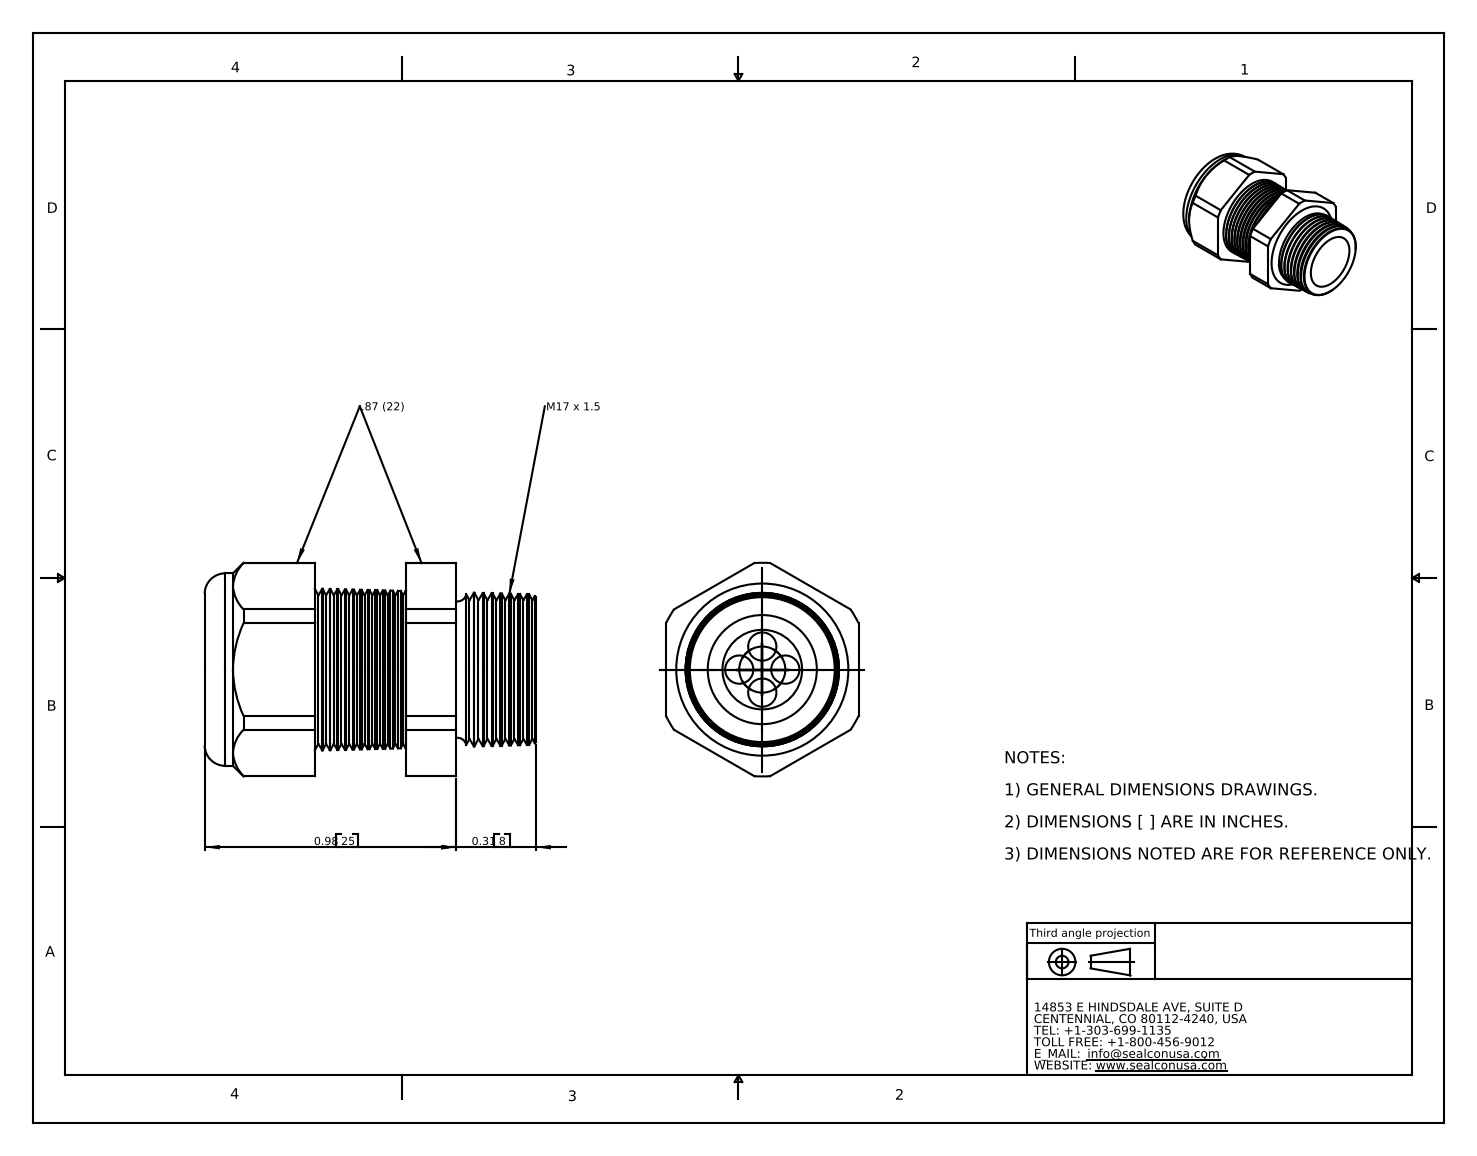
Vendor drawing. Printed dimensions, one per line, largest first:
0.98 25
0.31 8
